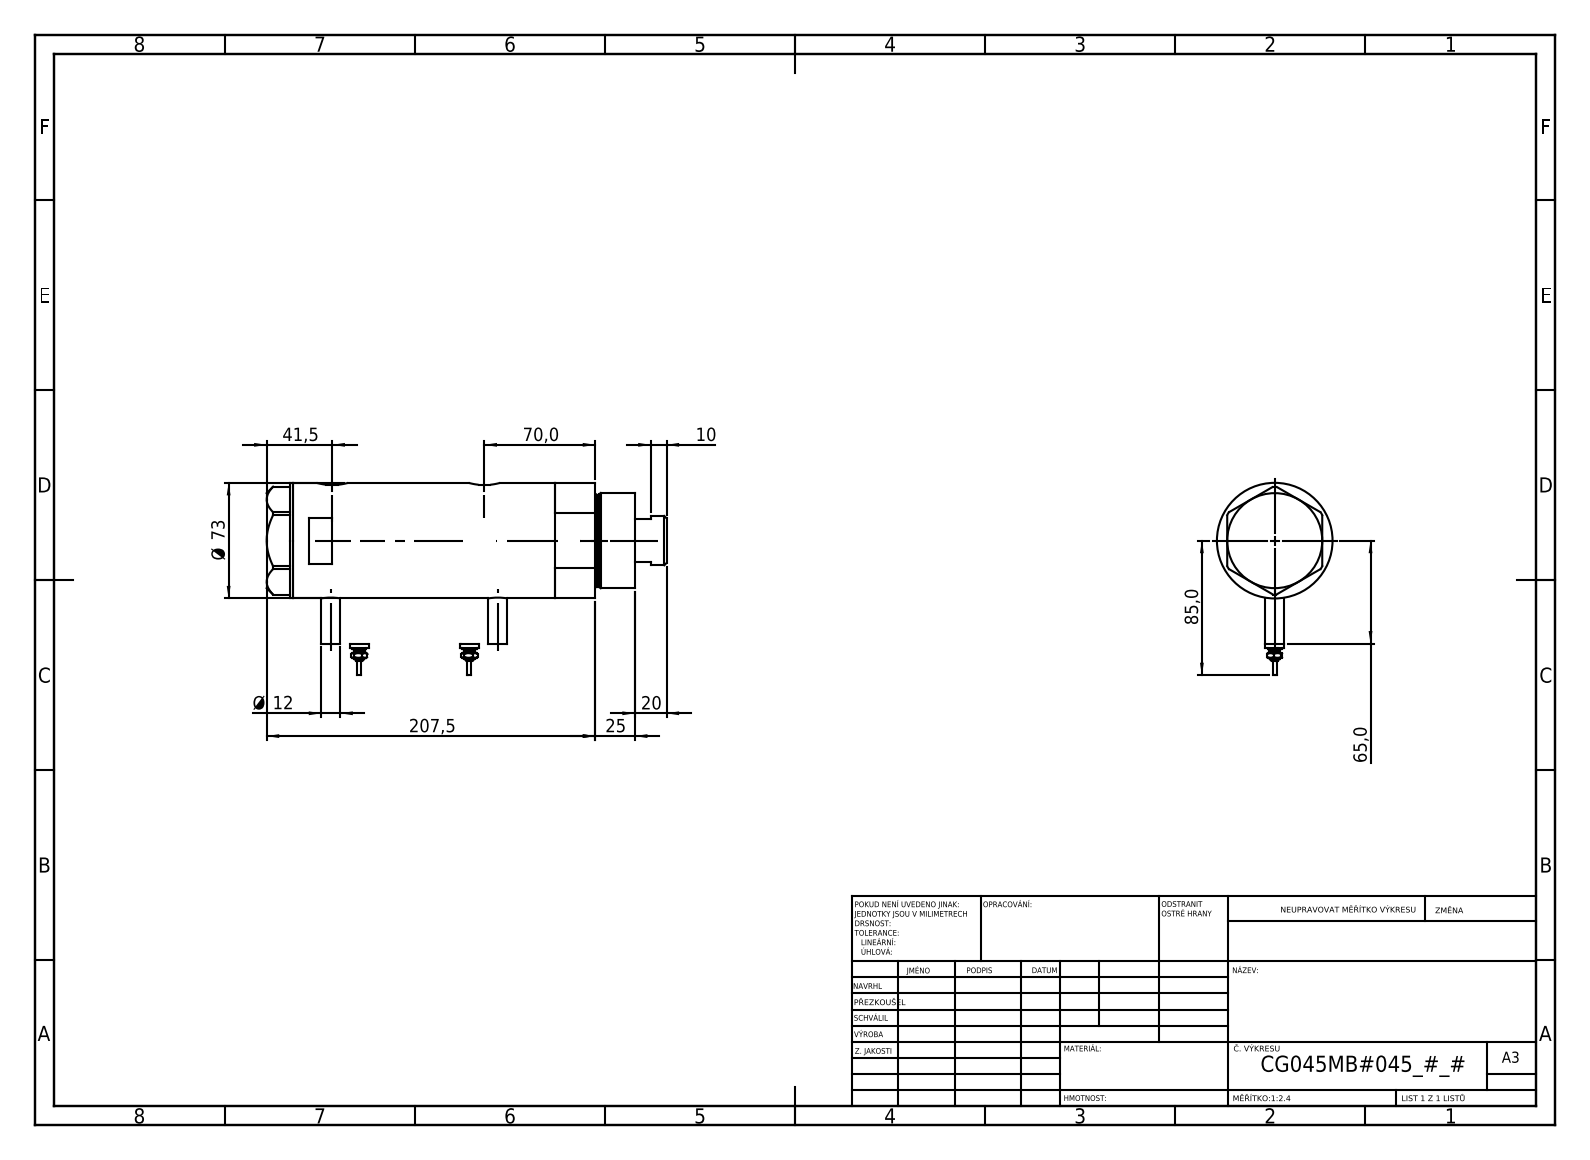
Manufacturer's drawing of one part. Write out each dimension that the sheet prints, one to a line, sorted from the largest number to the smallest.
207,5
85,0
Ø 73
70,0
65,0
41,5
25
20
Ø 12
10
